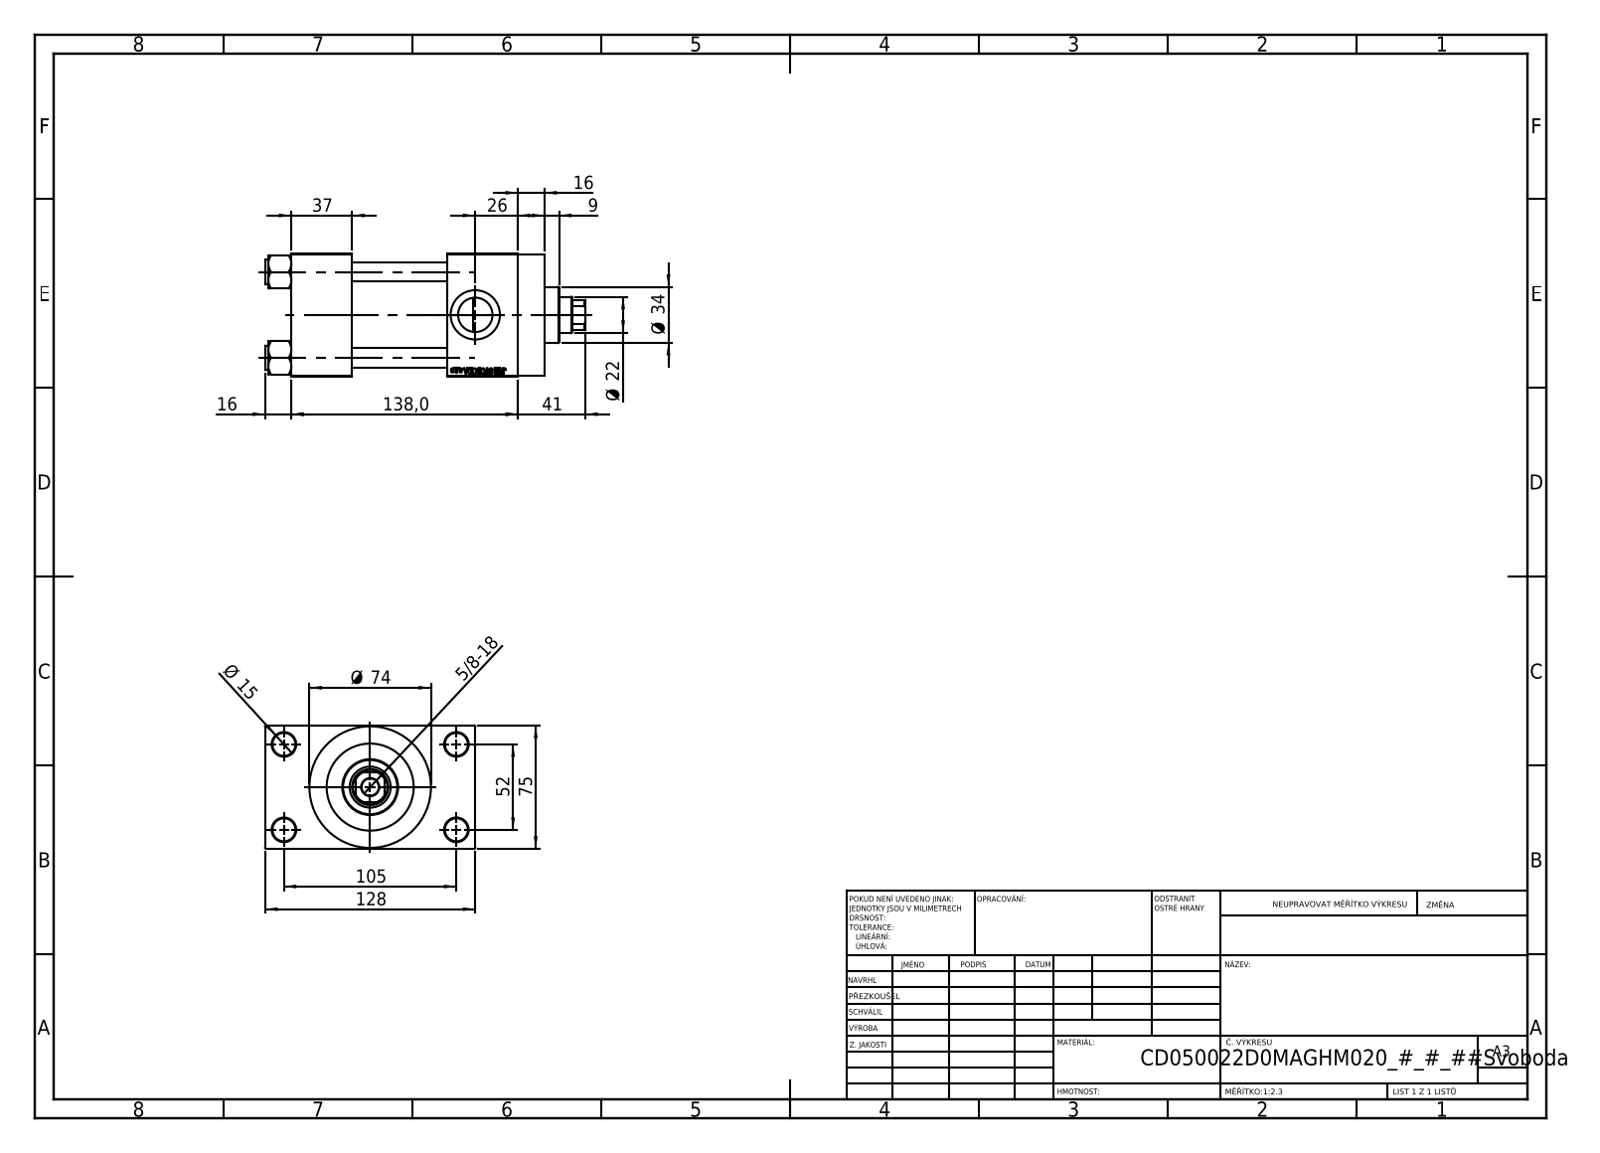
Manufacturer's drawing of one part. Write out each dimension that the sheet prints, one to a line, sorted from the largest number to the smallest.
138,0
128
105
75
Ø 74
52
41
37
Ø 34
26
Ø 22
16
16
Ø 15
9
5/8-18
